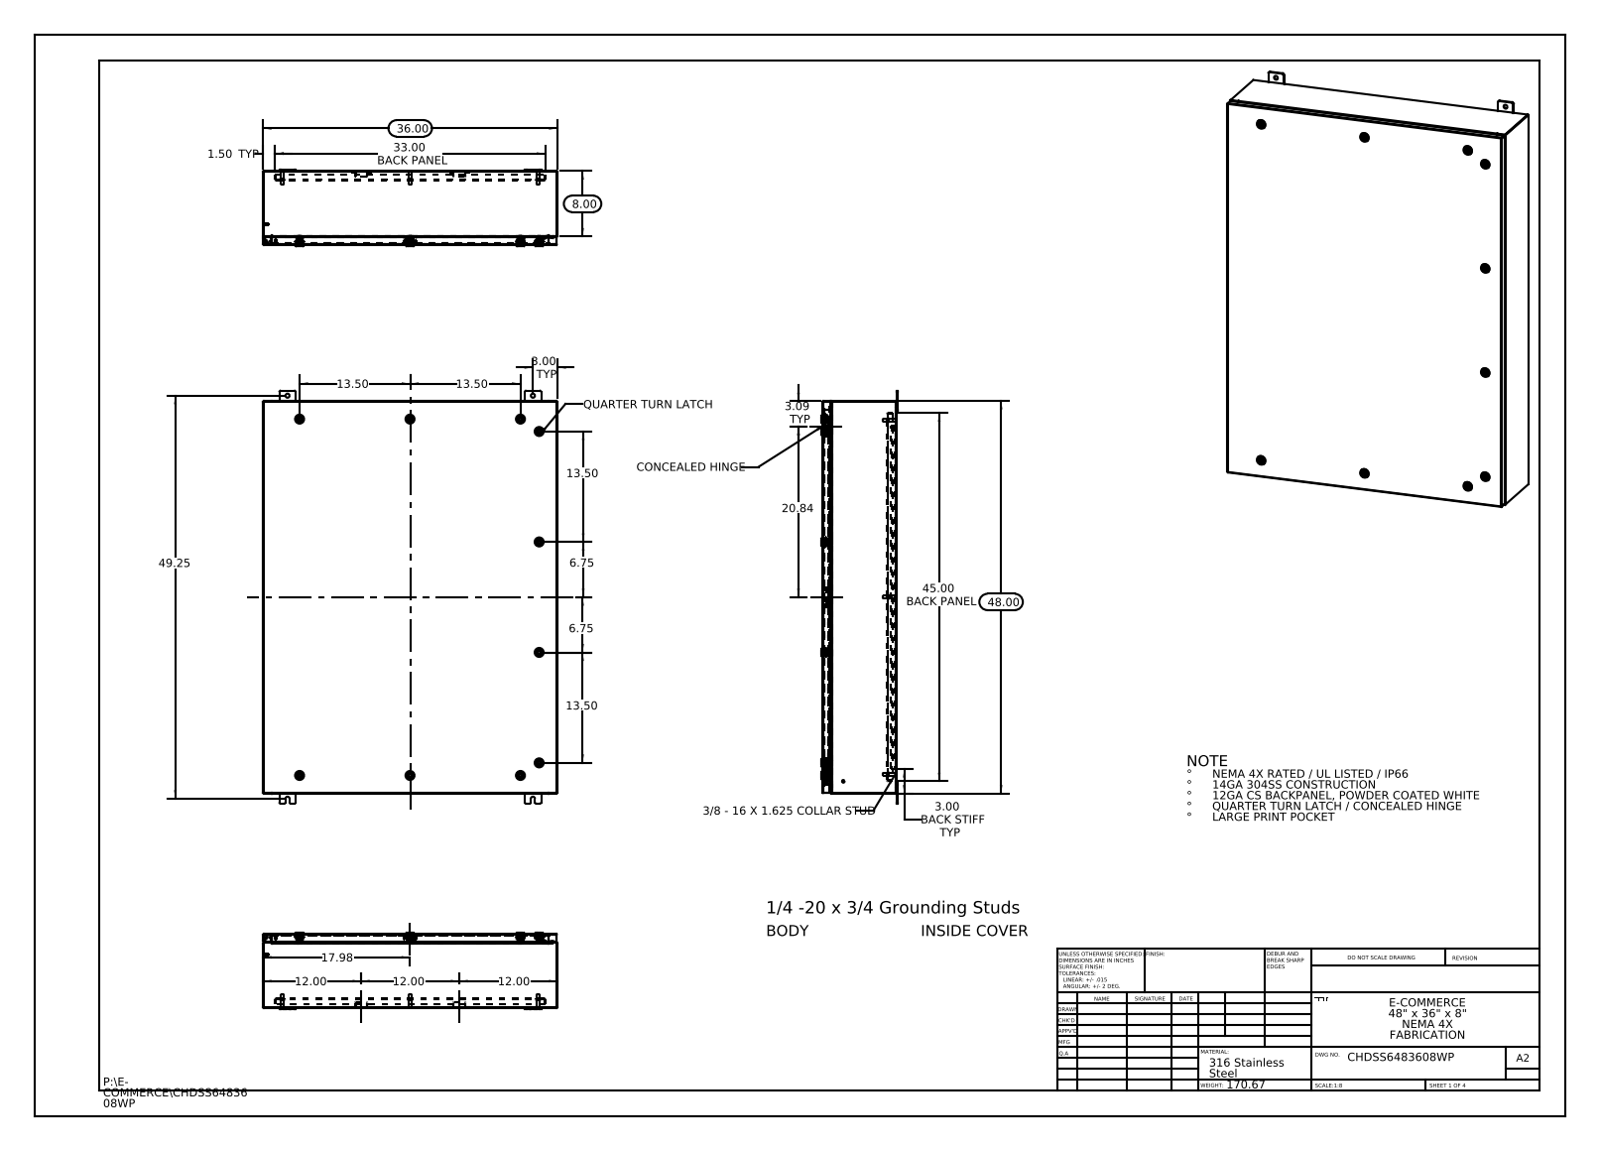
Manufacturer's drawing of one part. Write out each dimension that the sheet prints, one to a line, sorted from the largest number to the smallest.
49.25
48.00
45.00 BACK PANEL
36.00
33.00 BACK PANEL
20.84
17.98
13.50
13.50
13.50
13.50
12.00
12.00
12.00
8.00
6.75
6.75
3.09 TYP
3.00 TYP
3.00 BACK STIFF TYP
1.50 TYP
